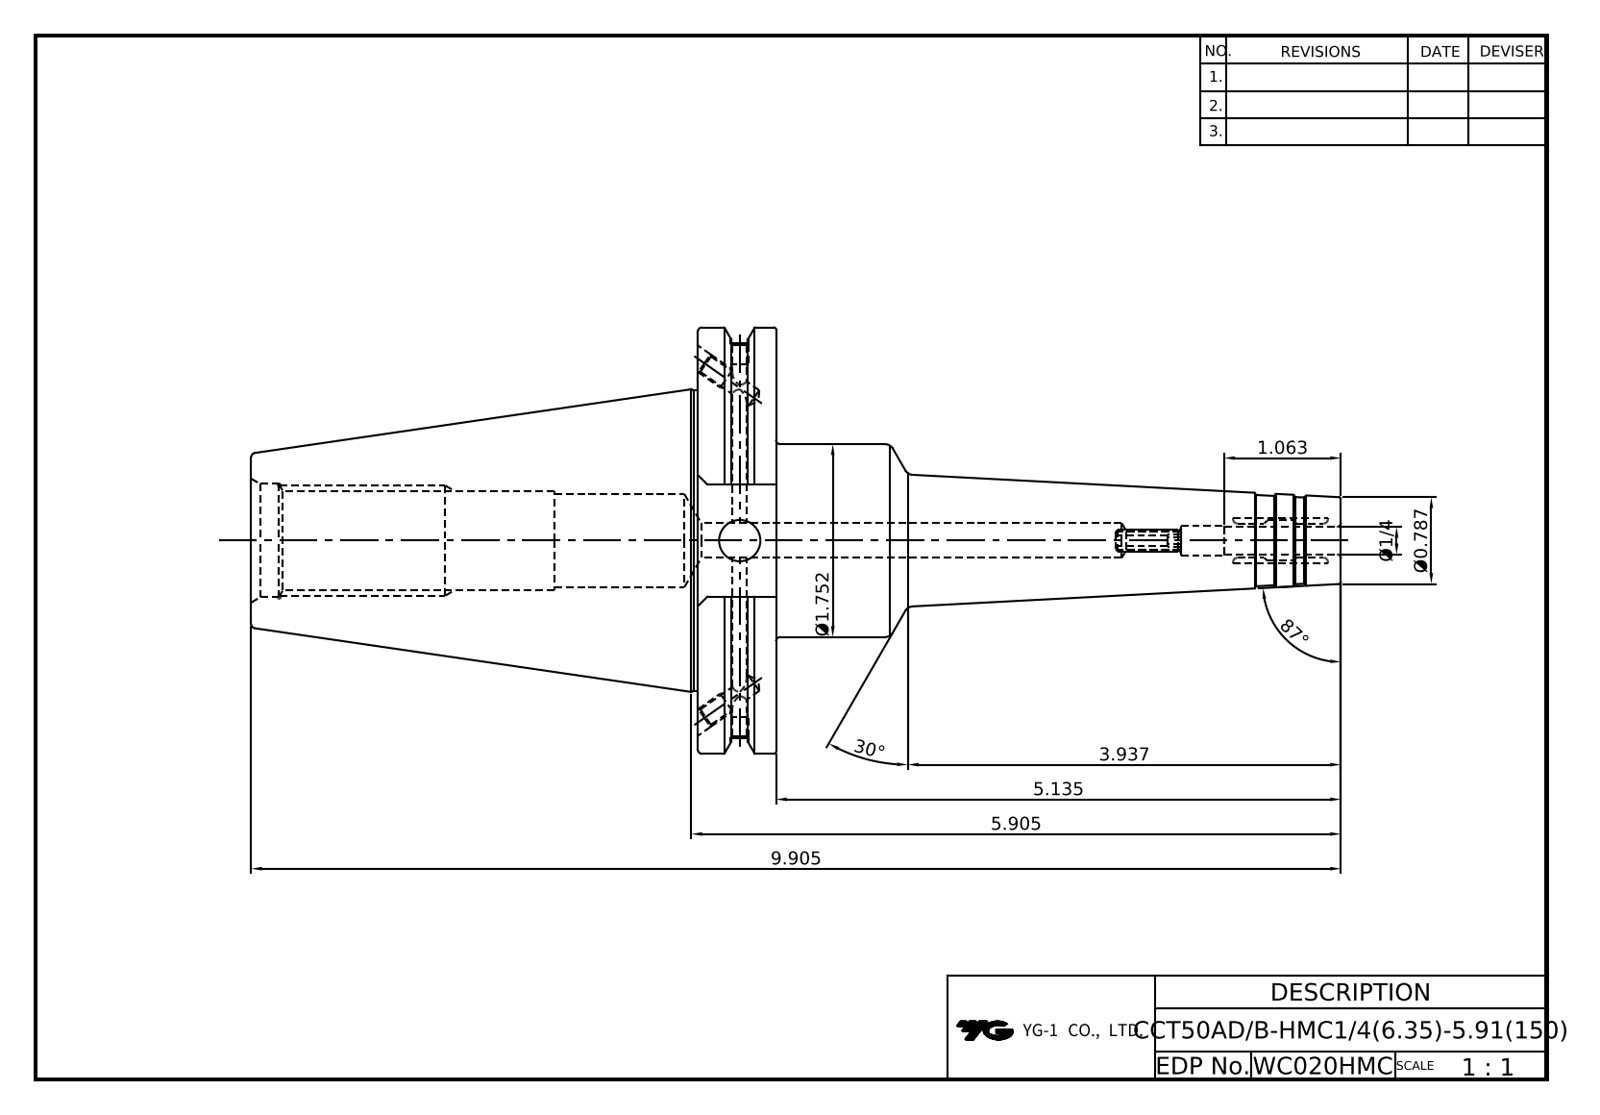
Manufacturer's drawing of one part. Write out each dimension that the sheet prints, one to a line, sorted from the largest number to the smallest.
87°
30°
9.905
5.905
5.135
3.937
Ø1.752
1.063
Ø0.787
Ø1/4
